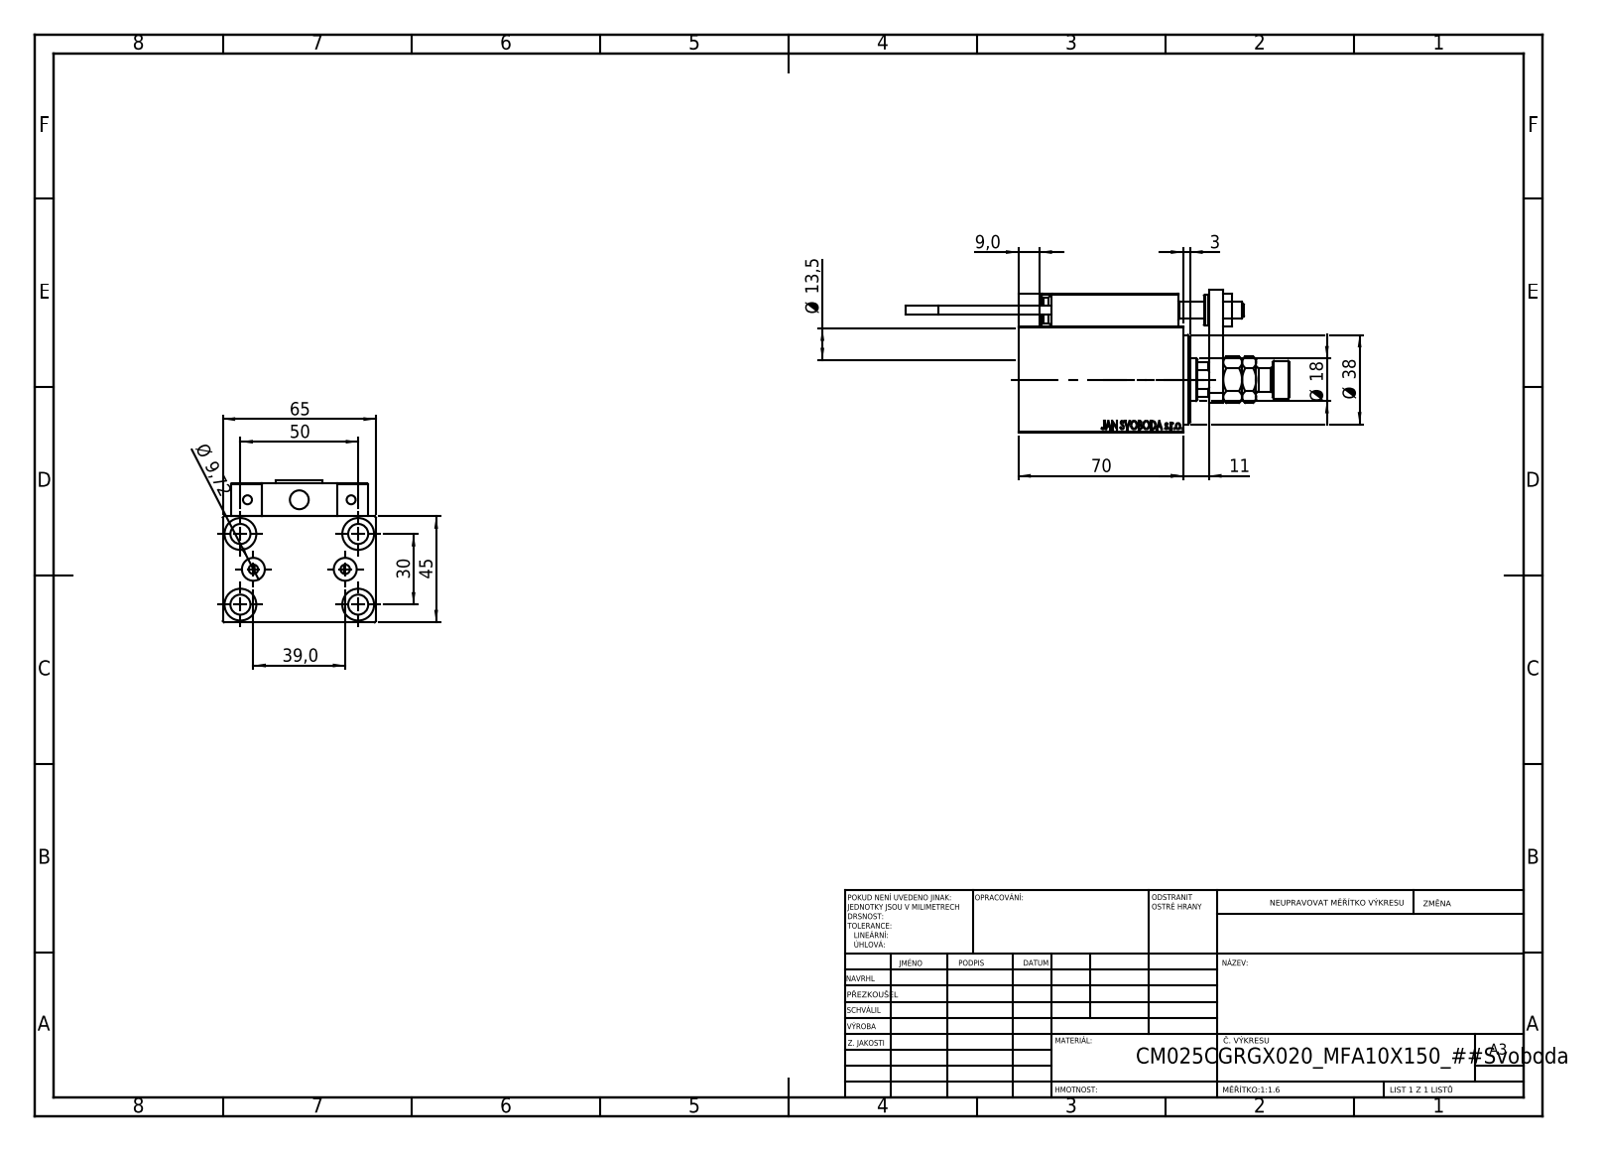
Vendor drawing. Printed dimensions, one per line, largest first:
70
65
50
45
39,0
Ø 38
30
Ø 18
Ø 13,5
11
Ø 9,72
9,0
3
